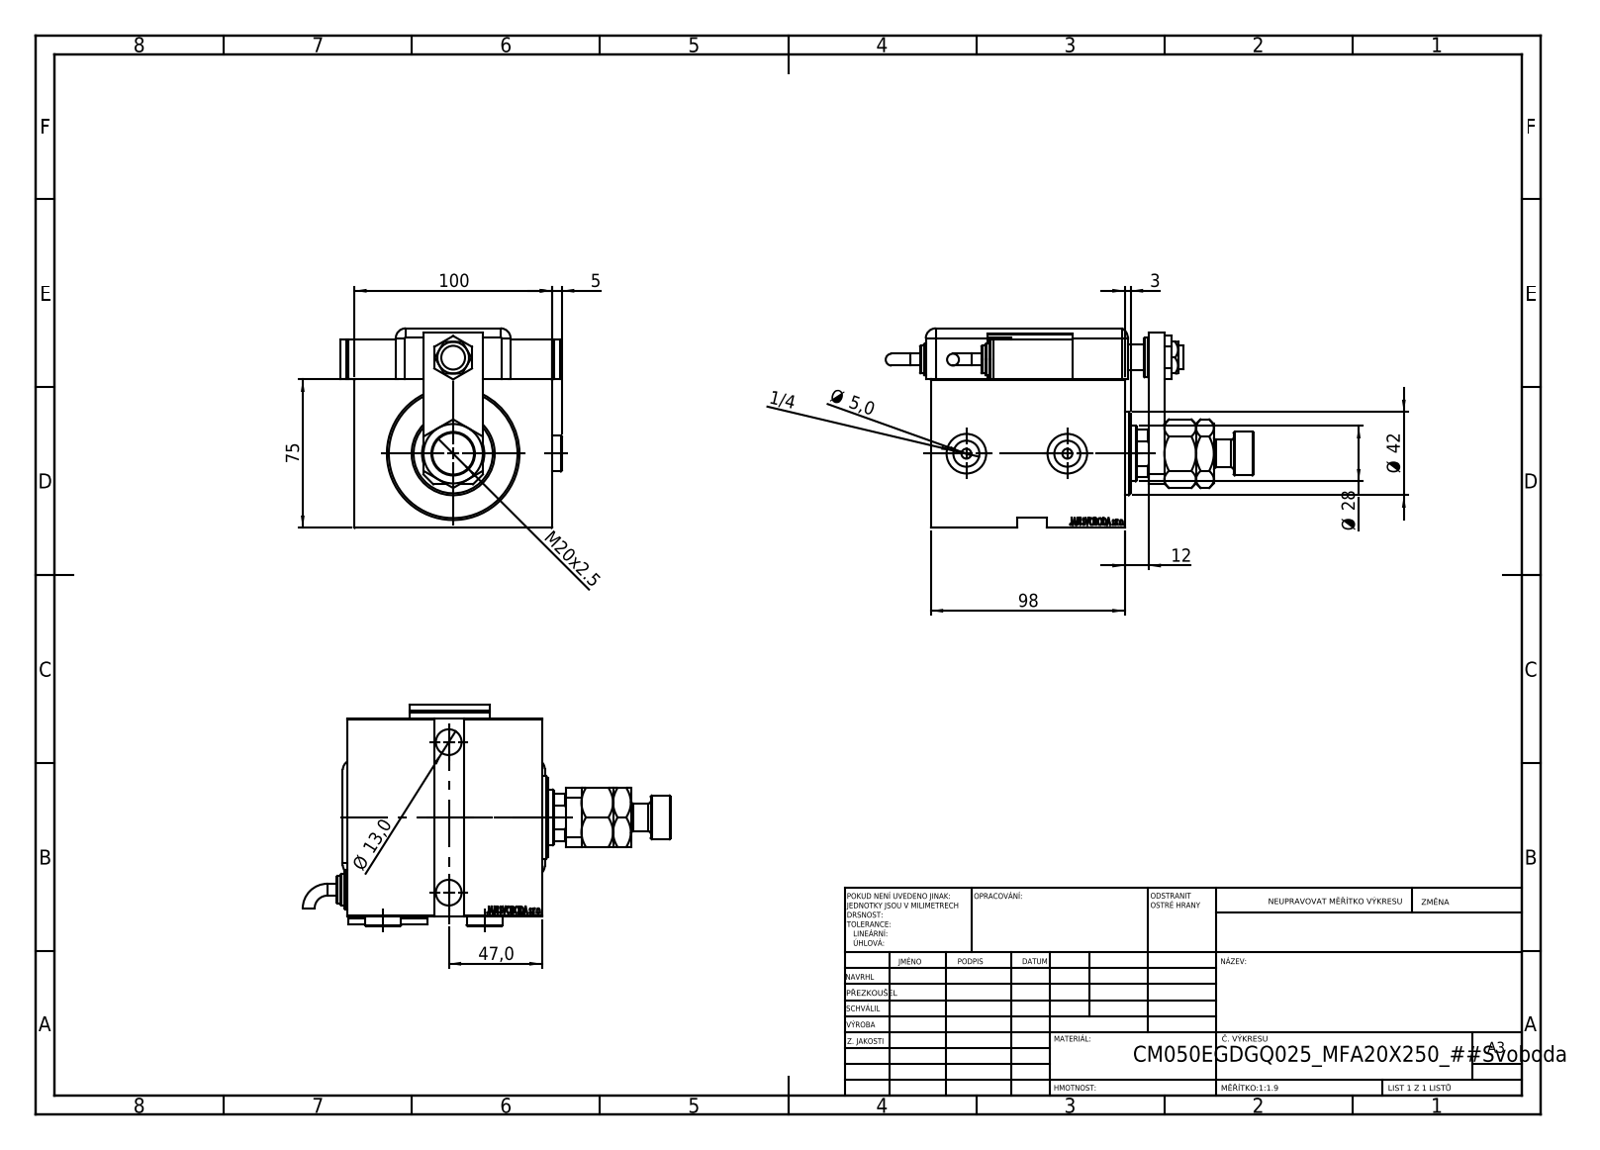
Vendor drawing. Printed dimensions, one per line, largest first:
100
98
75
47,0
Ø 42
Ø 28
M20x2.5
Ø 13,0
12
5
Ø 5,0
3
1/4
